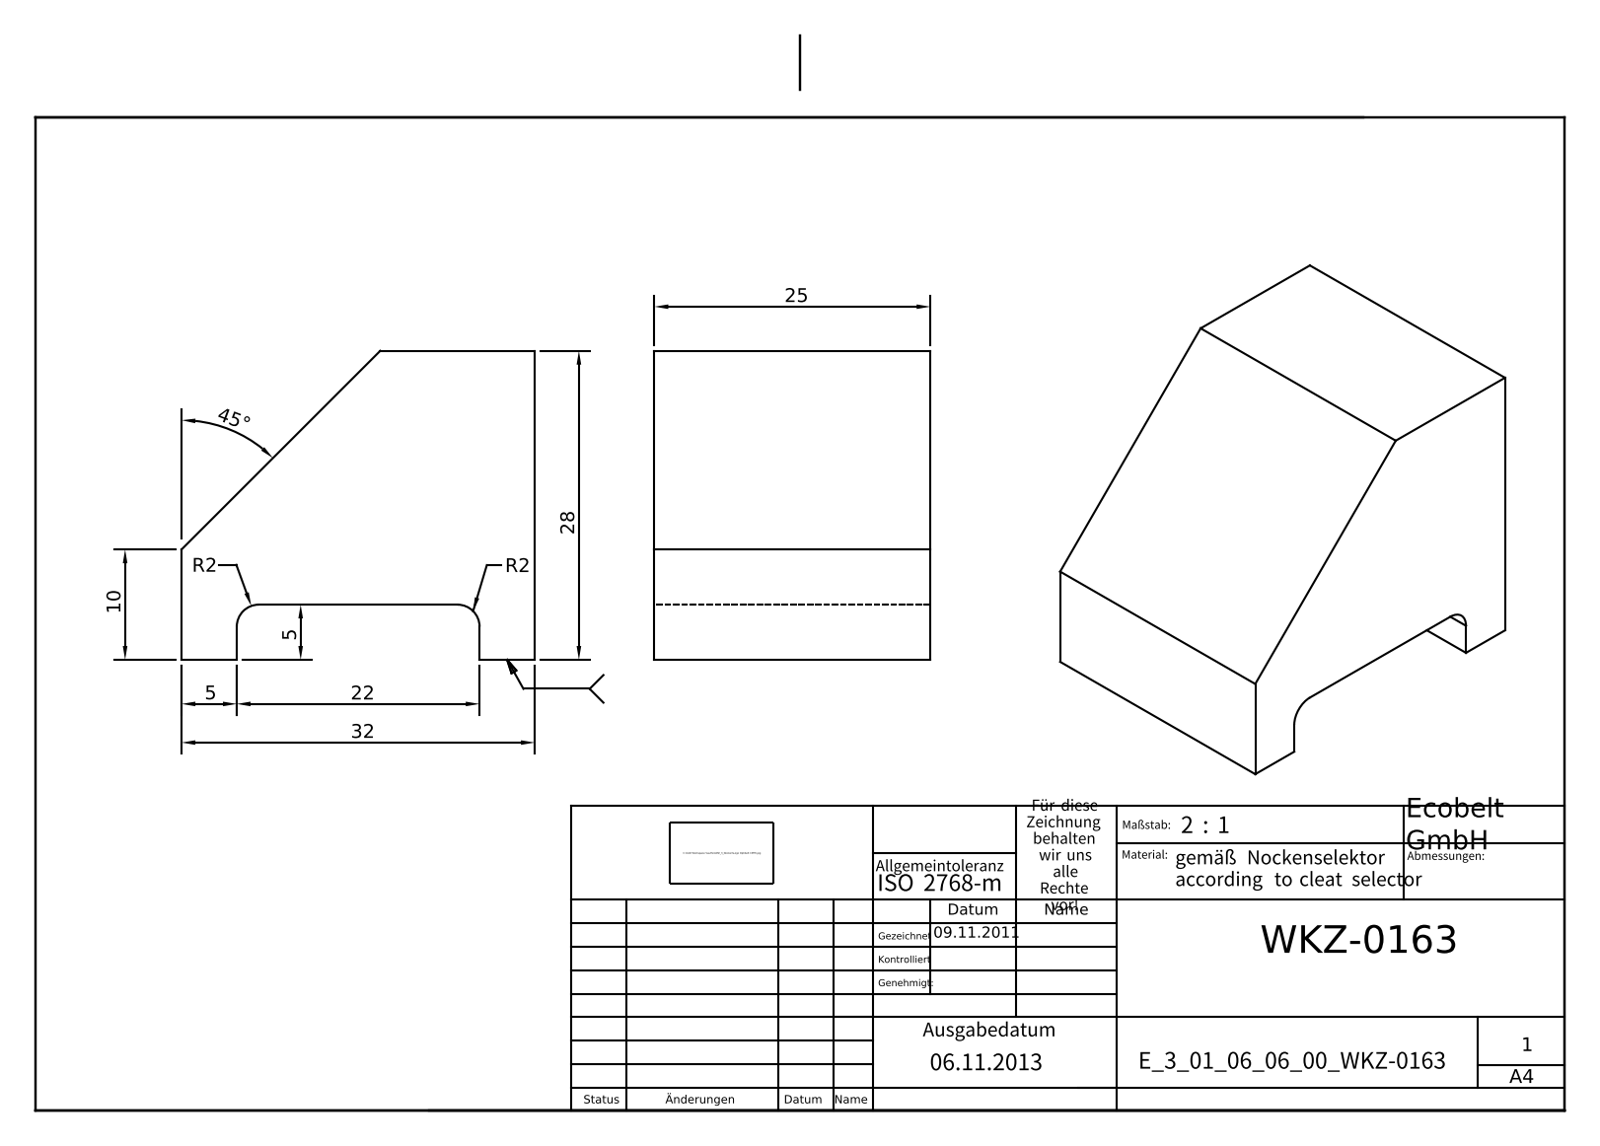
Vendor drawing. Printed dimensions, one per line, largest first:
45°
32
28
25
22
10
5
5
R2
